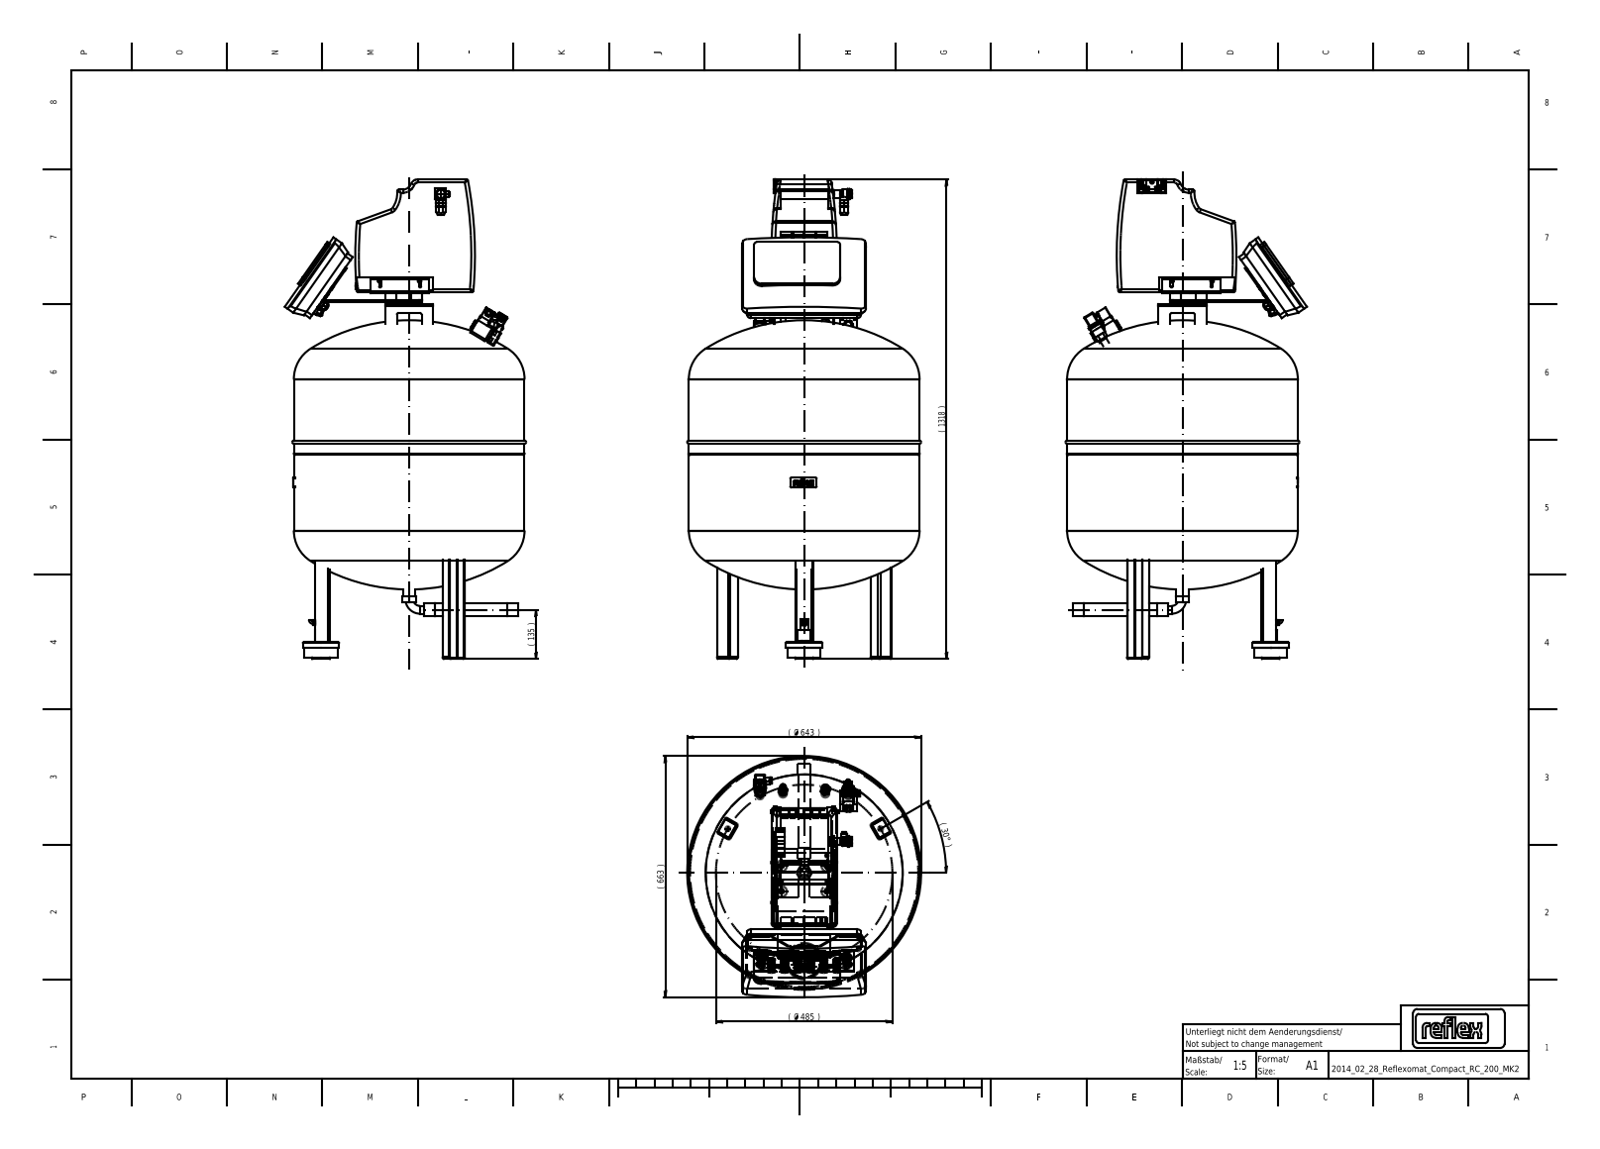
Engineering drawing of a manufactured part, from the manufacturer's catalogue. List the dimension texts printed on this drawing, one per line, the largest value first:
1318 ( )
663 ( )
643 Ø ( )
485 Ø ( )
135 ( )
30 ° ( )
